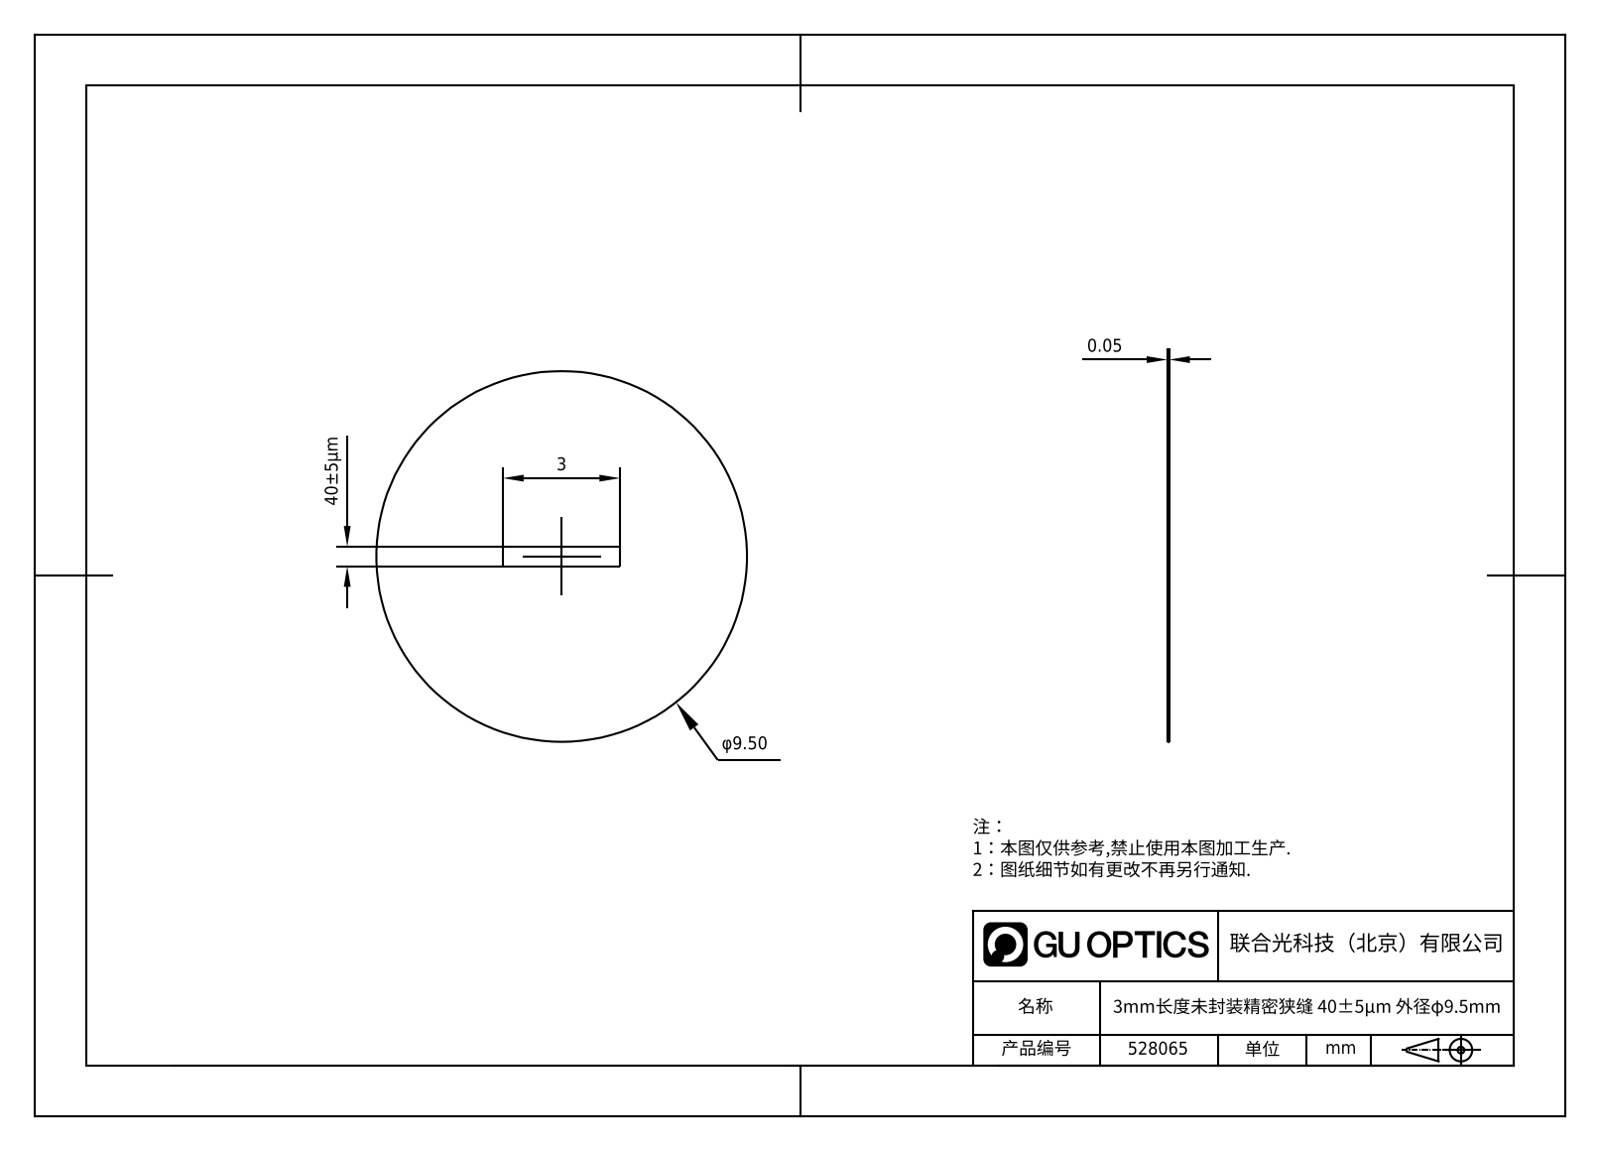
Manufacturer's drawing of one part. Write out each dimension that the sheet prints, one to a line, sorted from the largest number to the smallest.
40±5μm
3
0.05
